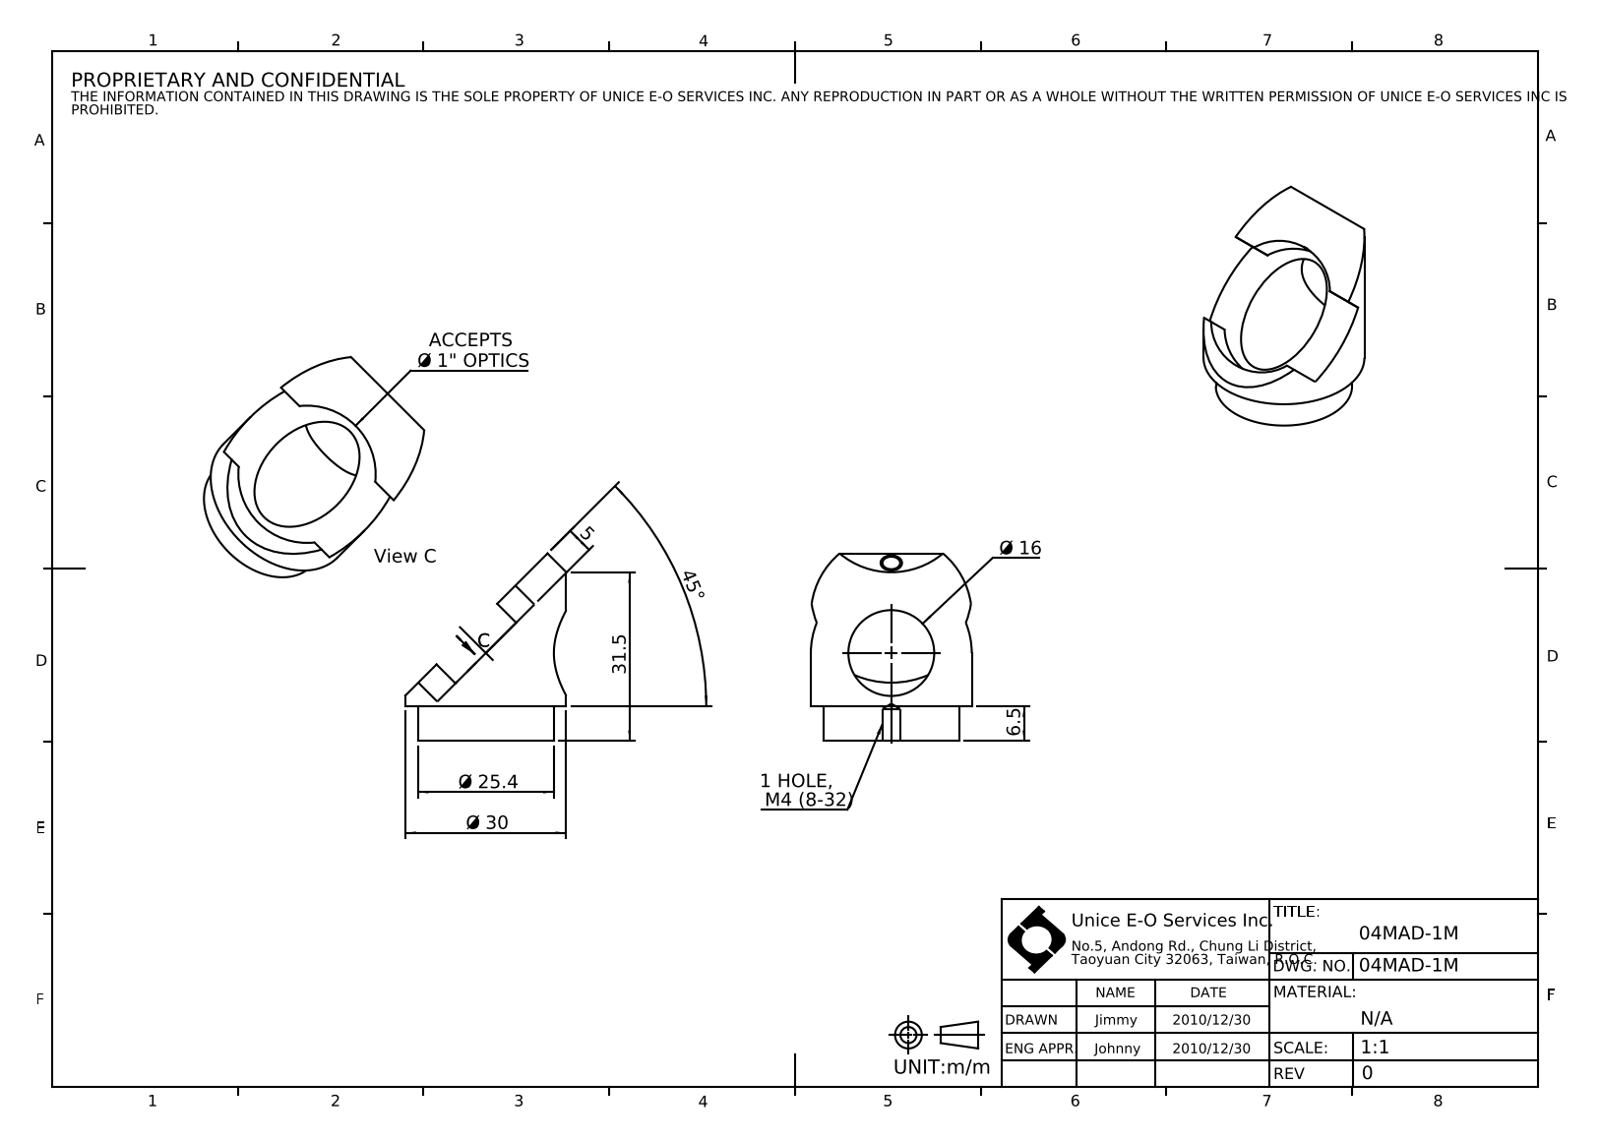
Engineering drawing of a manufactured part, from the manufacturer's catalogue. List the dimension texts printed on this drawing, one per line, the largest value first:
45°
31.5
Ø 30
Ø 25.4
Ø 16
6.5
5
ACCEPTS Ø 1" OPTICS
